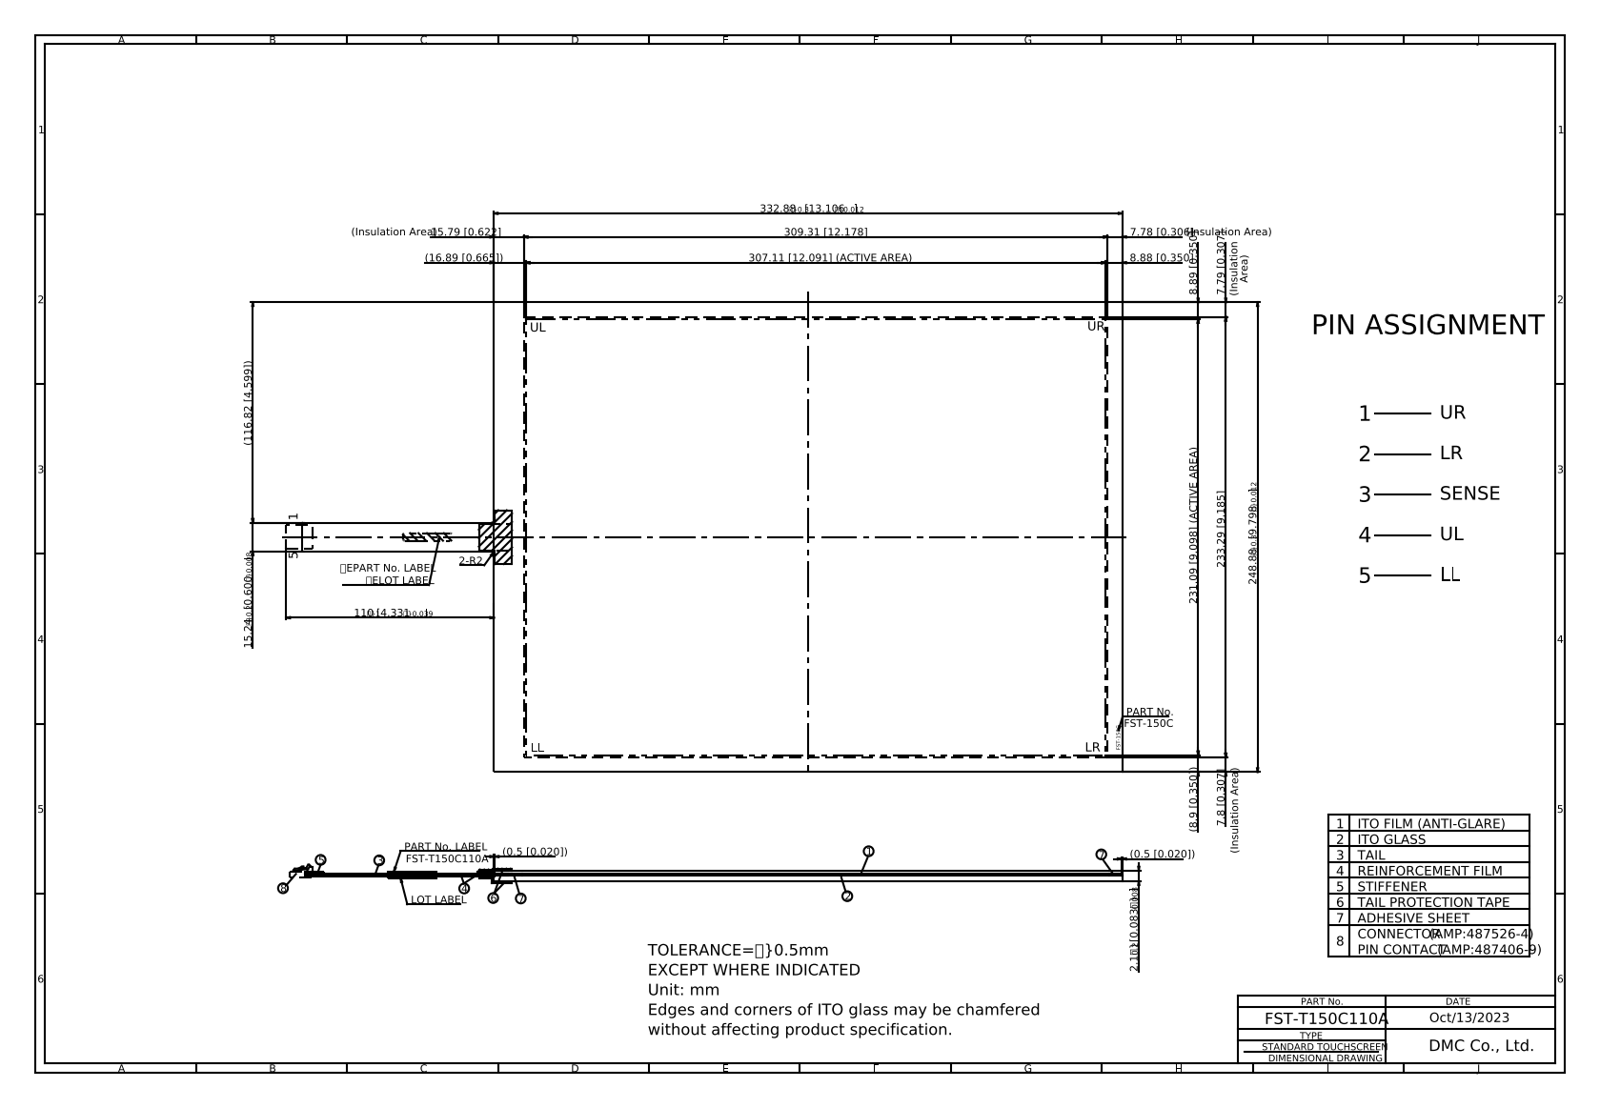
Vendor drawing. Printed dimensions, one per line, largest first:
332.88
309.31 [12.178]
307.11 [12.091] (ACTIVE AREA)
248.88
233.29 [9.185]
231.09 [9.098] (ACTIVE AREA)
(116.82 [4.599])
110.00
(16.89 [0.665])
15.79 [0.622]
15.24
(8.9 [0.350])
8.89 [0.350]
8.88 [0.350]
7.8 [0.307]
7.79 [0.307]
7.78 [0.306]
2.1?}{\H0.75x;0.2} [0.083?}{\H0.75x;0.008}]
(0.5 [0.020])
(0.5 [0.020])
